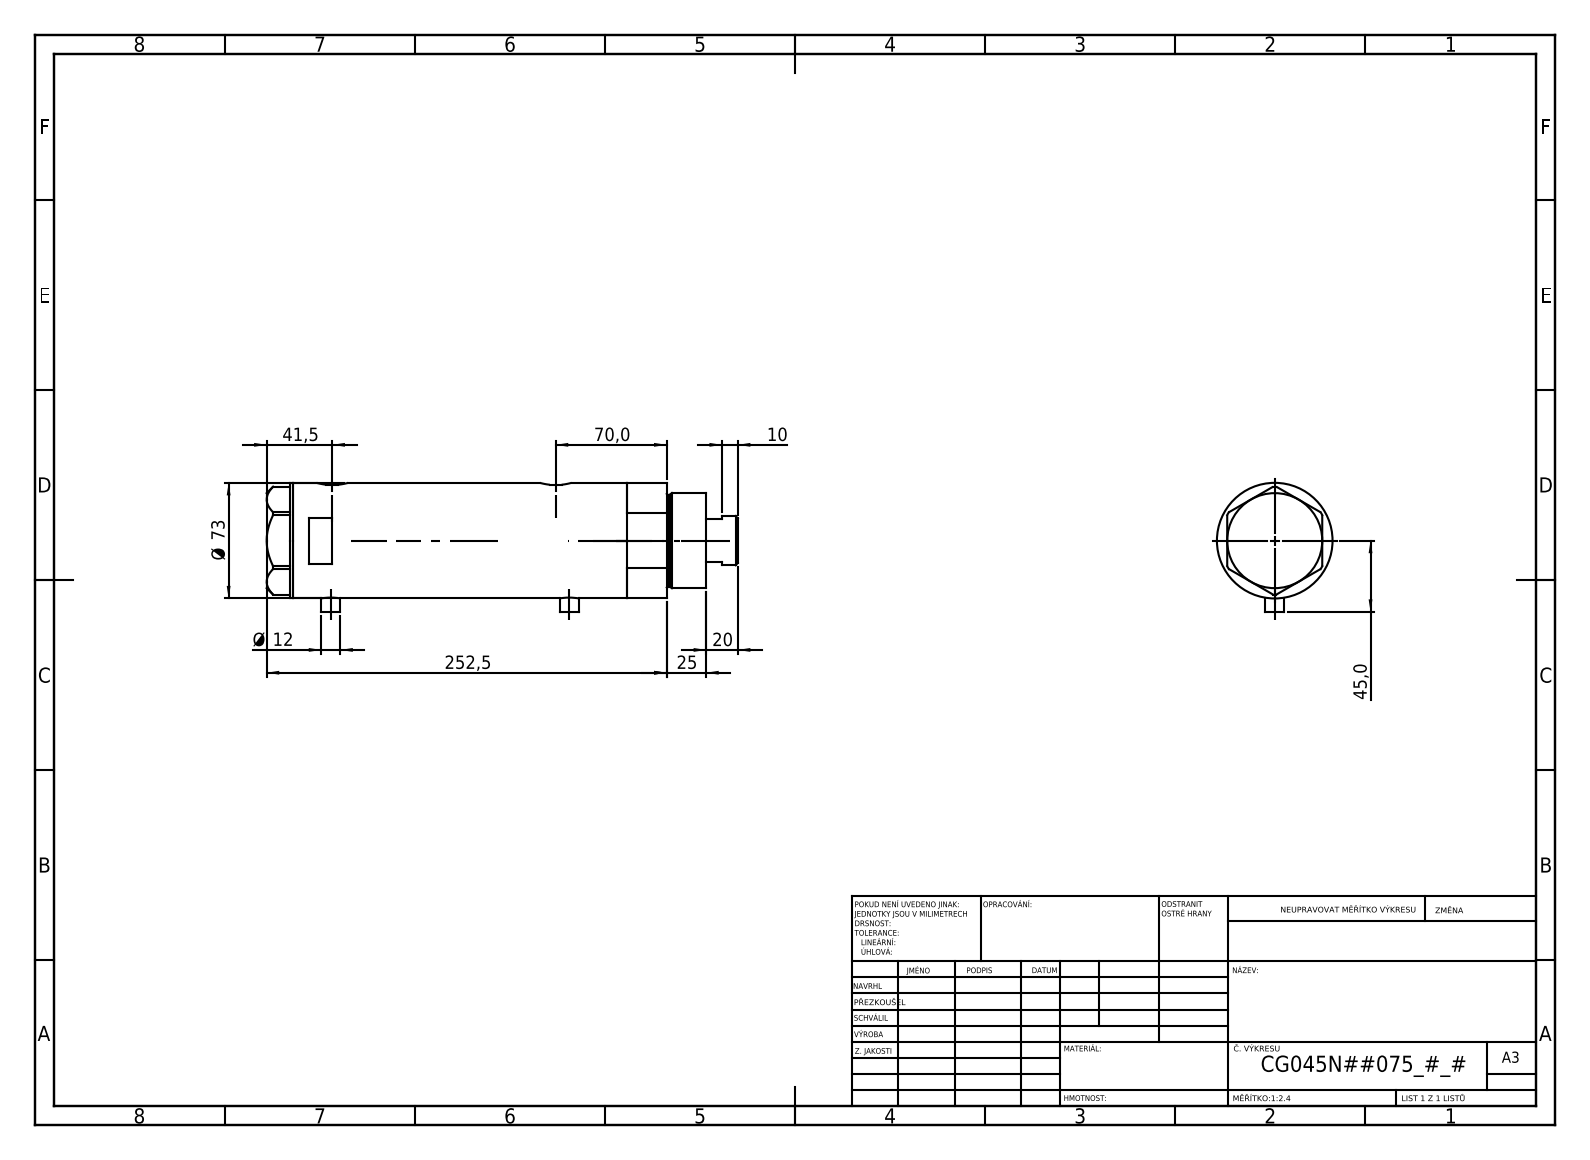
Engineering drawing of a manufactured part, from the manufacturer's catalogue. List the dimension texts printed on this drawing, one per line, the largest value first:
252,5
Ø 73
70,0
45,0
41,5
25
20
Ø 12
10
